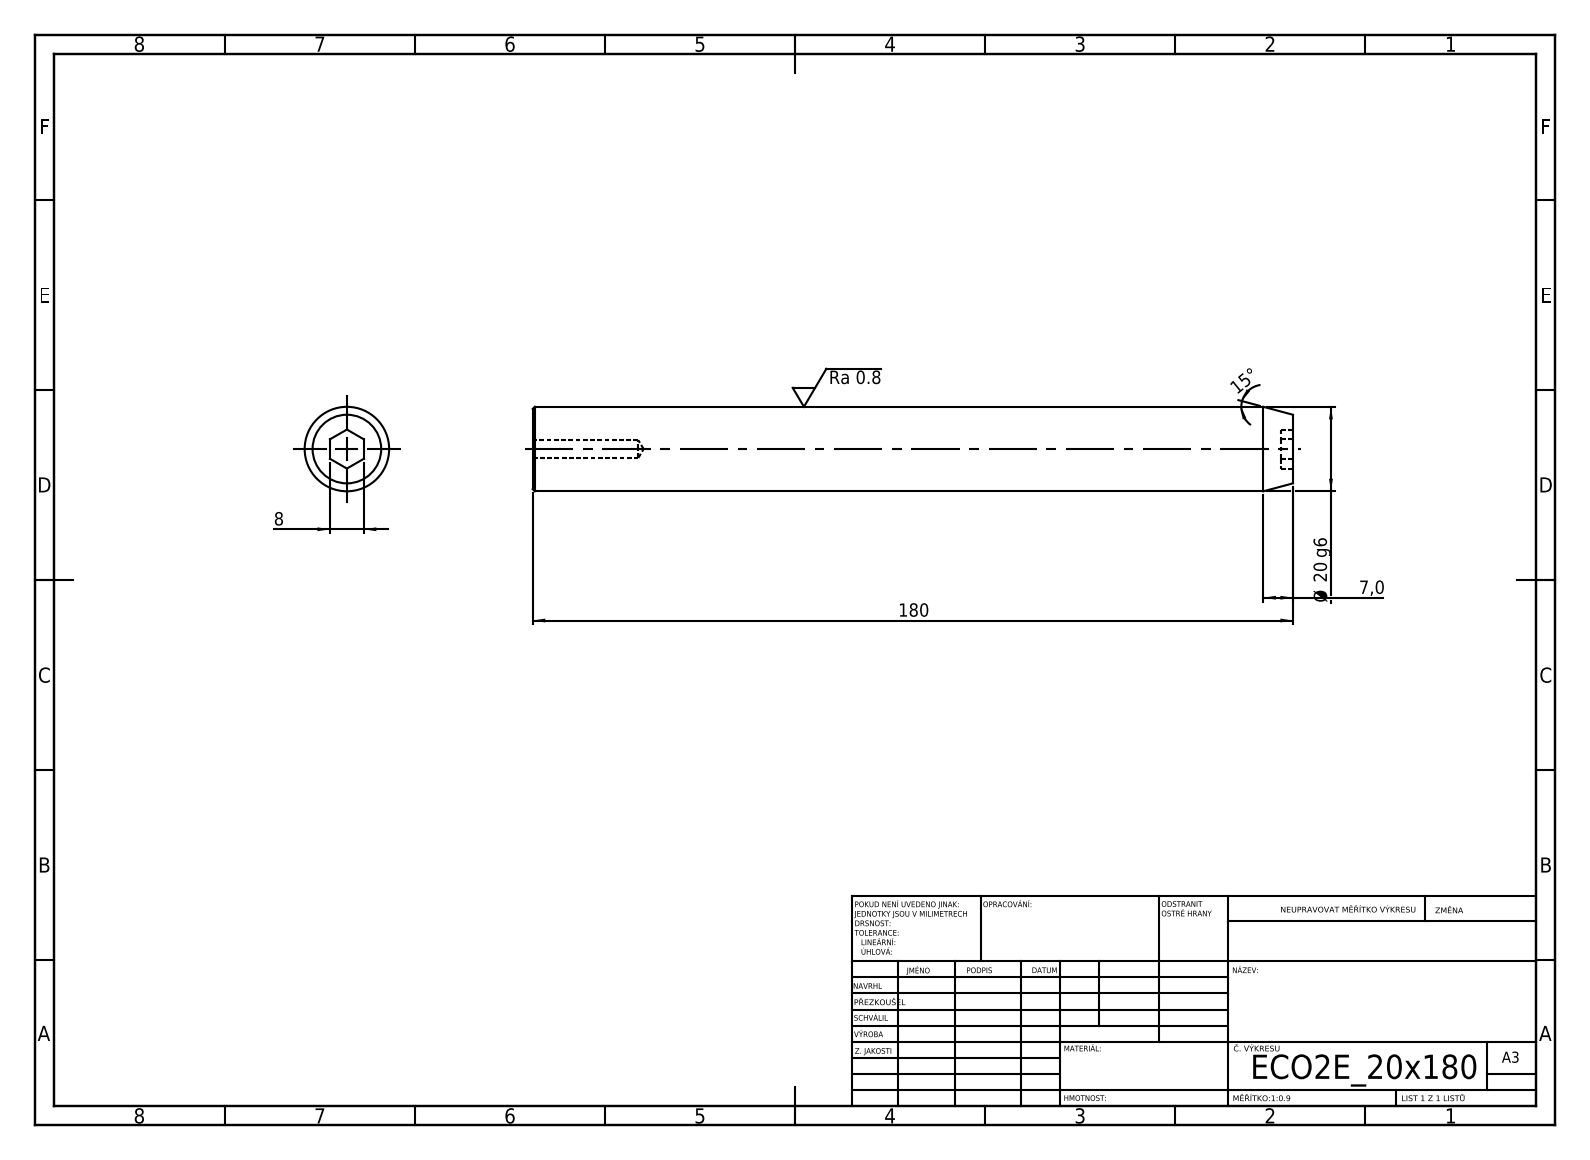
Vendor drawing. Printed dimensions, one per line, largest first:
180
Ø 20 g6
15°
8
7,0
